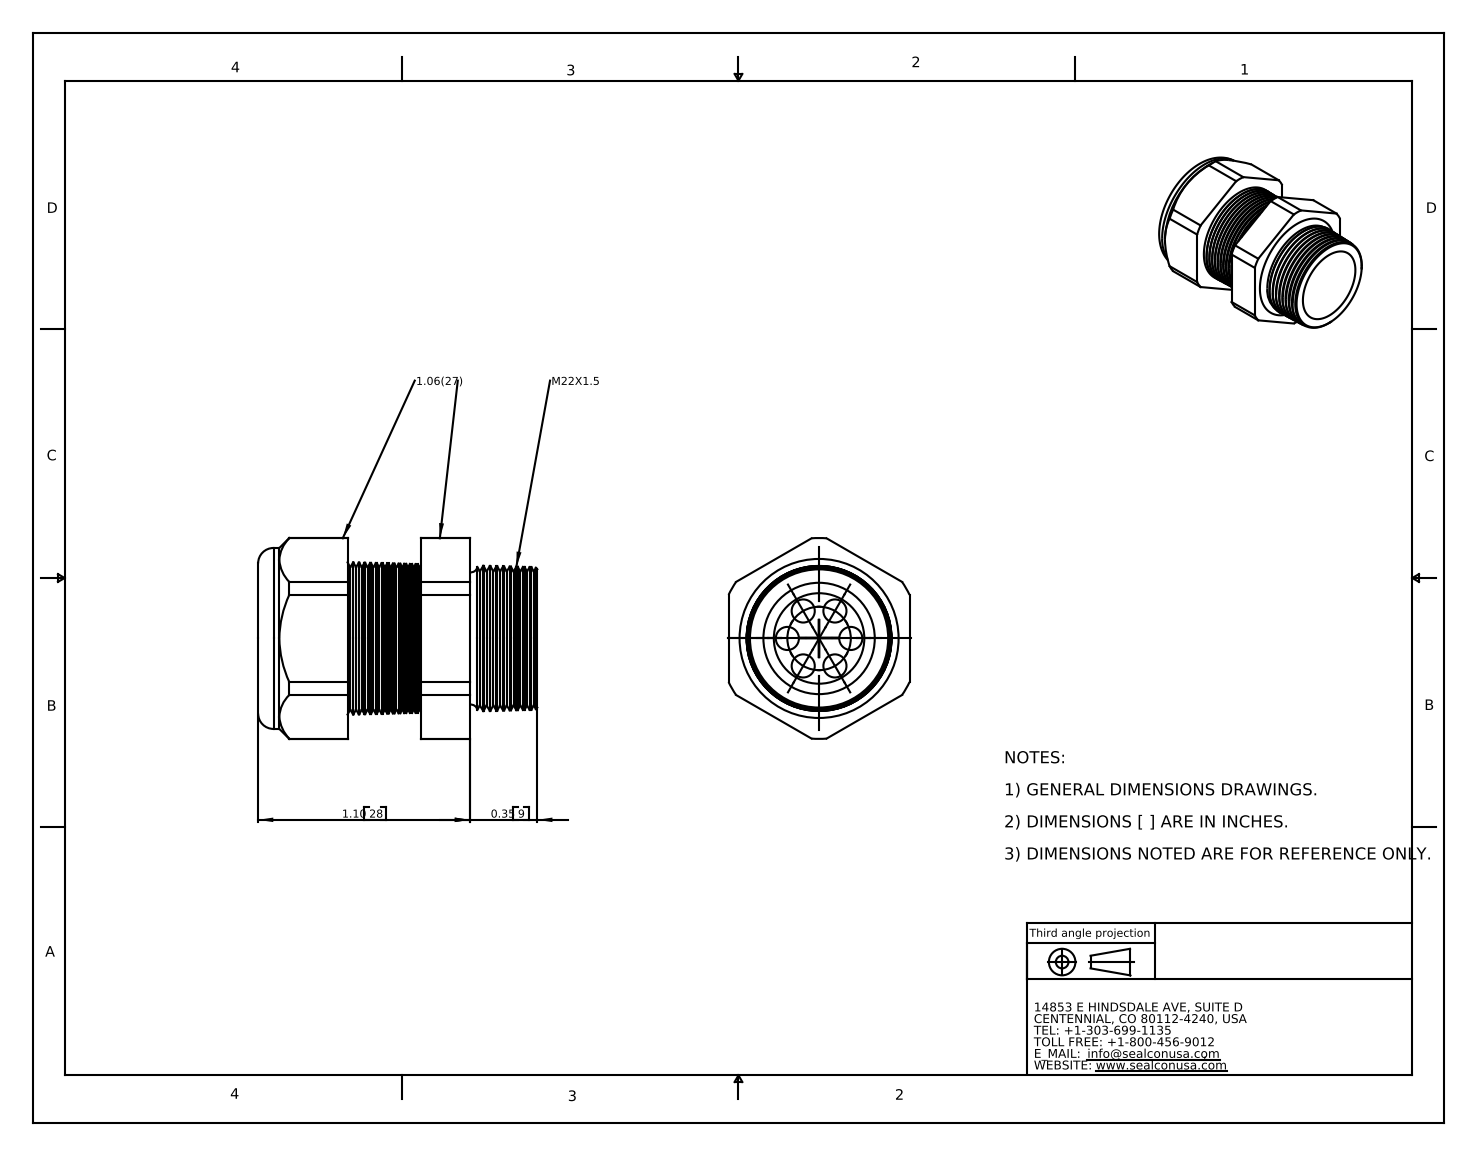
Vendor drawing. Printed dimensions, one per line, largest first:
1.10 28
0.35 9
